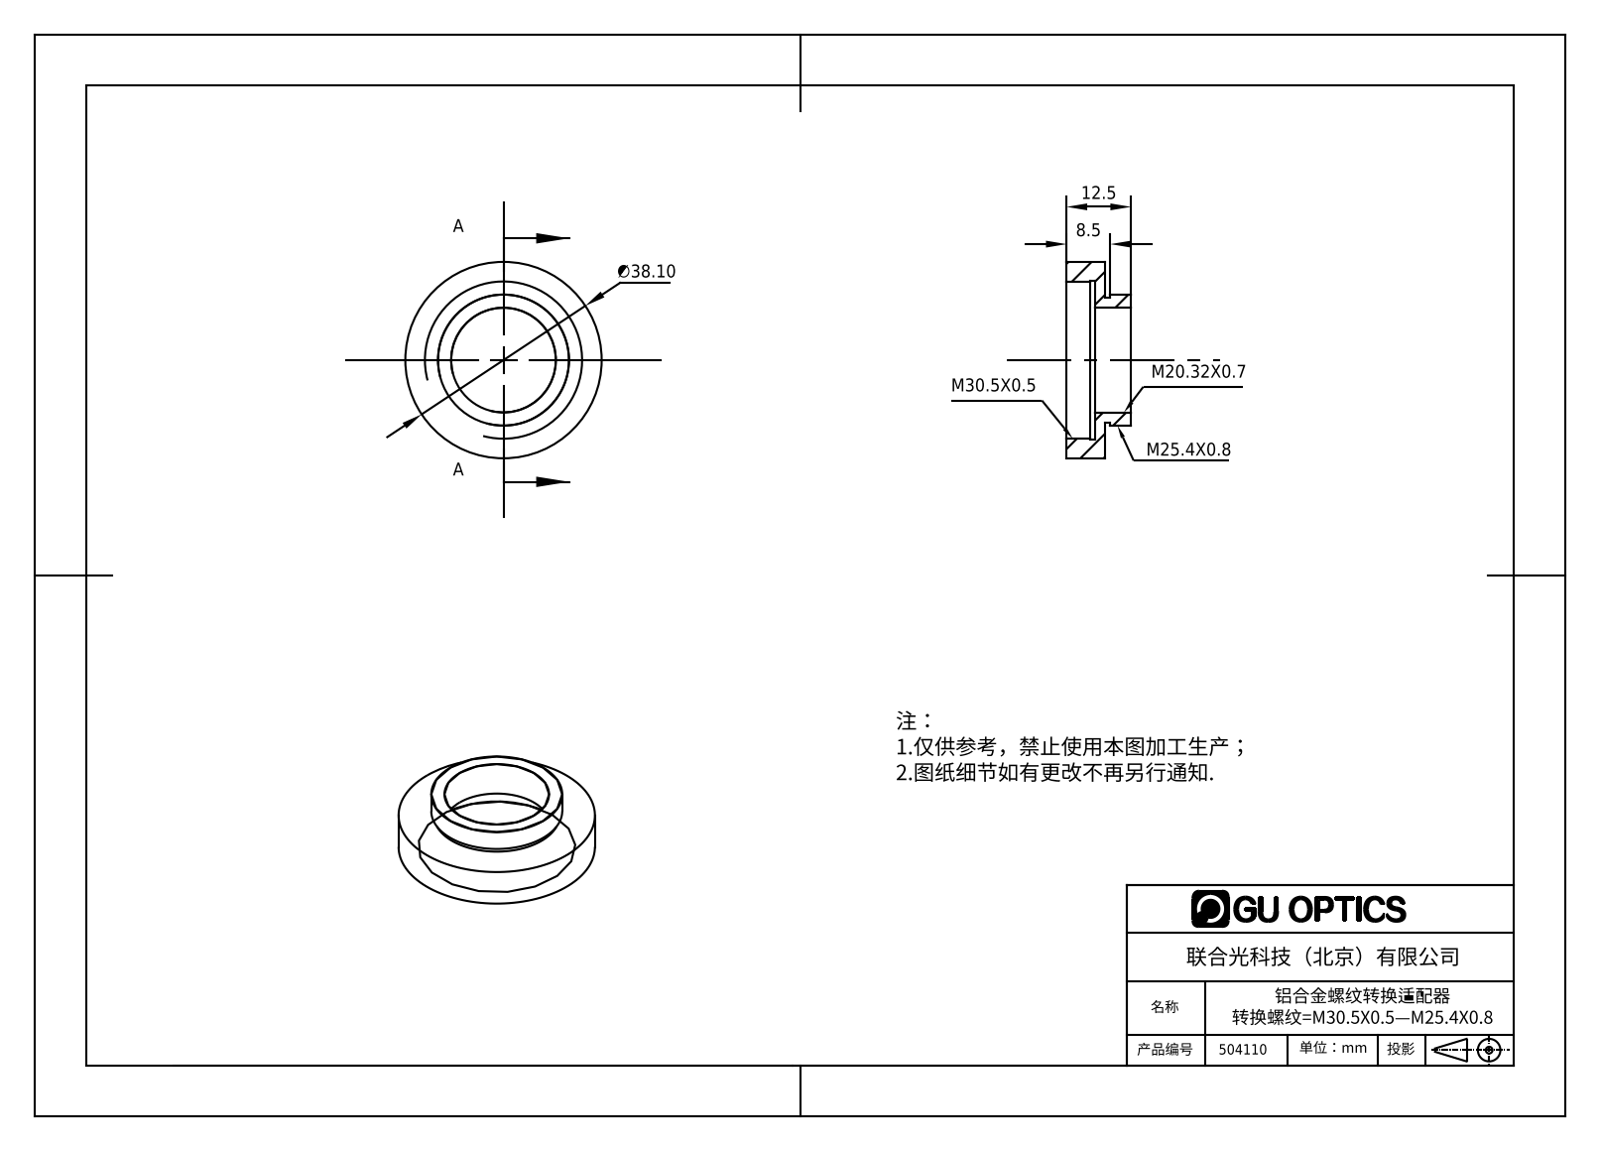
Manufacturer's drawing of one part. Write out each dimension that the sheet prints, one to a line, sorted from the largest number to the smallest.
∅38.10
12.5
8.5
